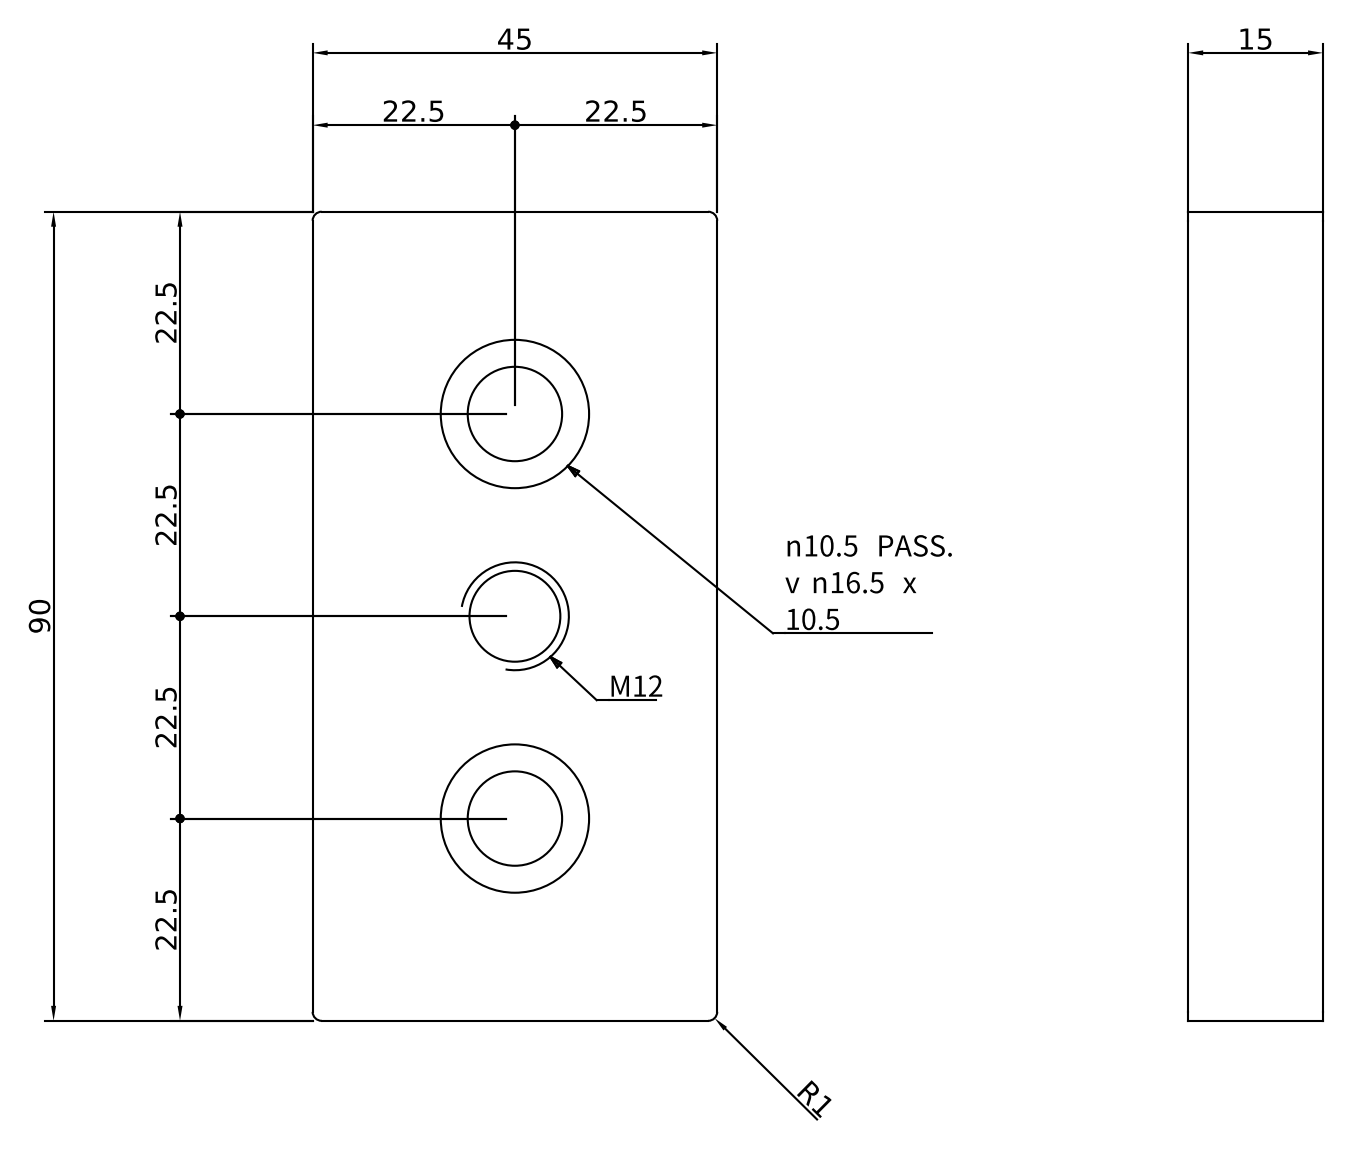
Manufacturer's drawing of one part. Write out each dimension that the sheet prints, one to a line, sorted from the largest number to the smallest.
90
45
22.5
22.5
22.5
22.5
22.5
22.5
15
R1
